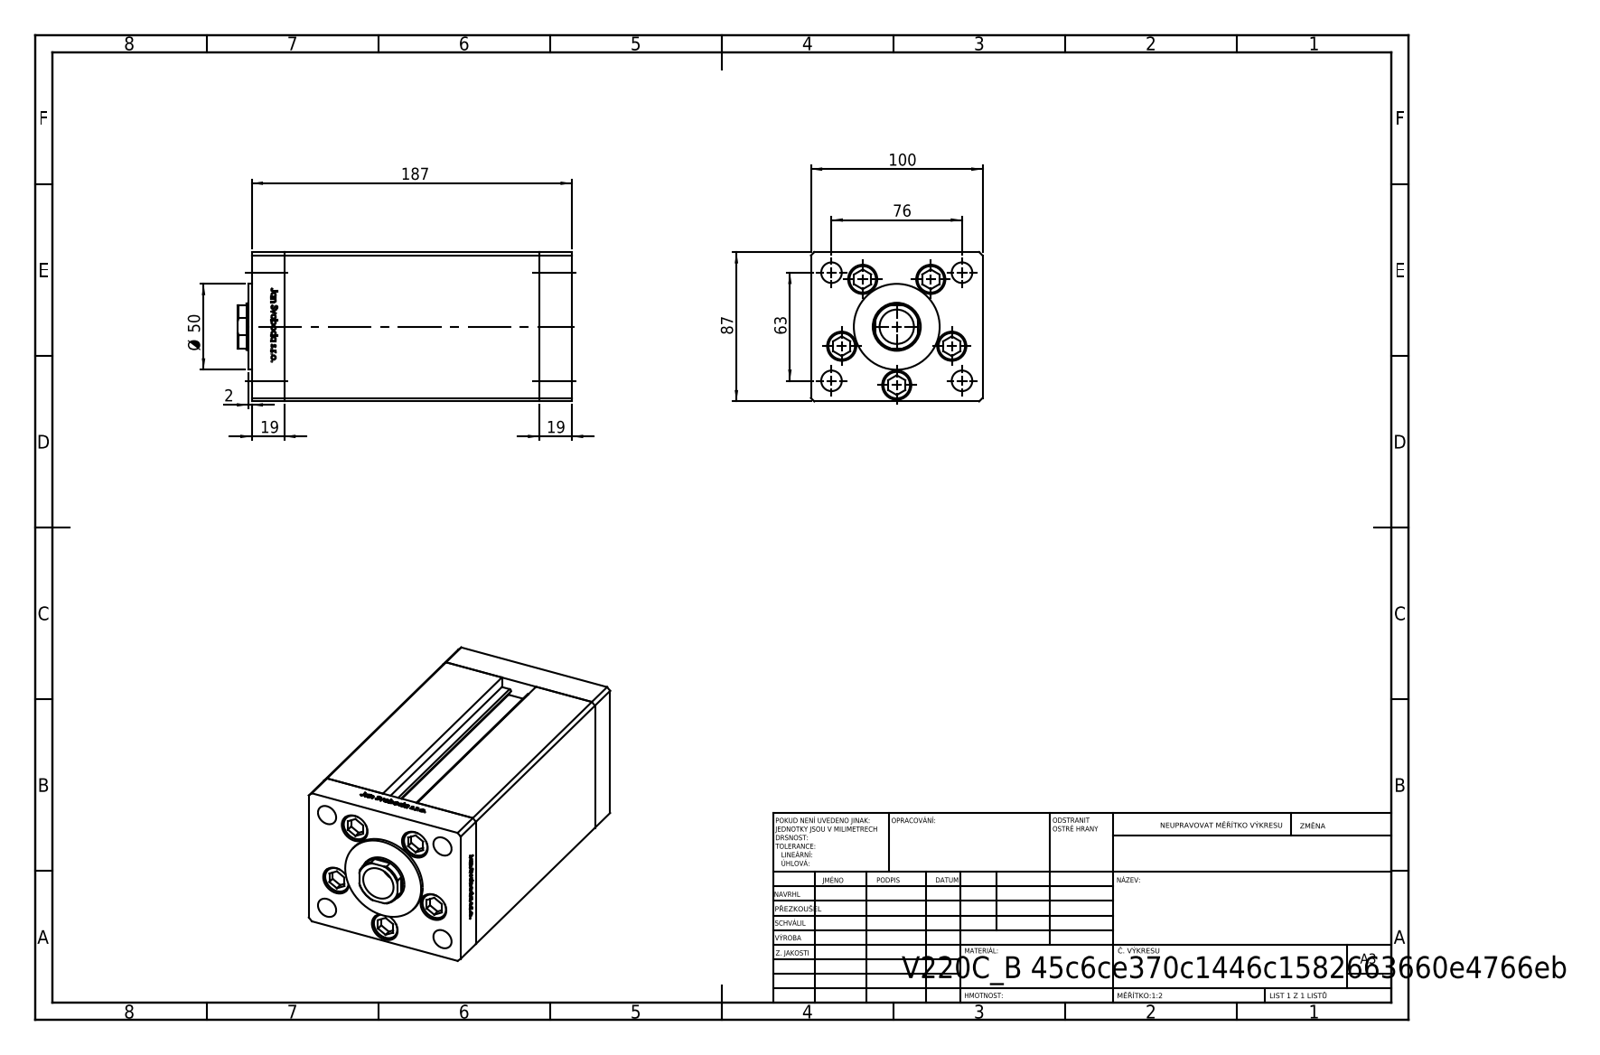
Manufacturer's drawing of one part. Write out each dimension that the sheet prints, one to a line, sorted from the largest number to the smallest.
187
100
87
76
63
Ø 50
19
19
2
